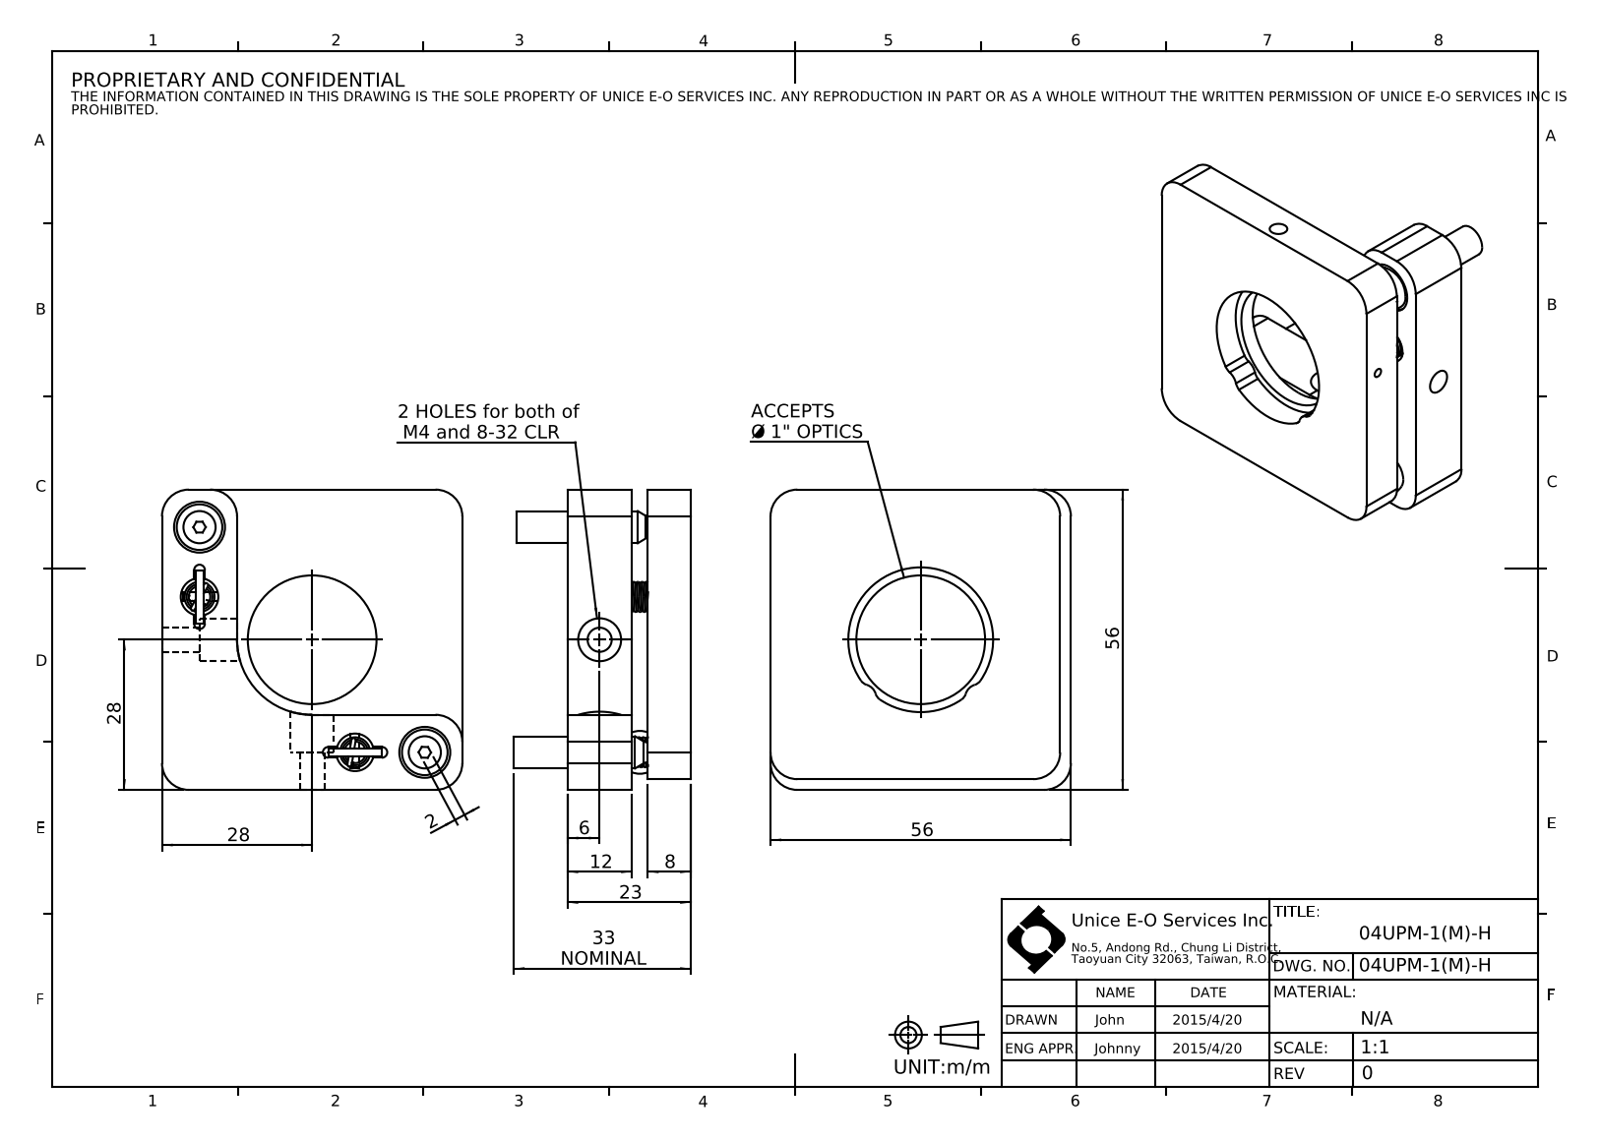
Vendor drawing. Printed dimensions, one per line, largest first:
56
56
33 NOMINAL
28
28
23
12
8
6
2
2 HOLES for both of M4 and 8-32 CLR
ACCEPTS Ø 1" OPTICS
